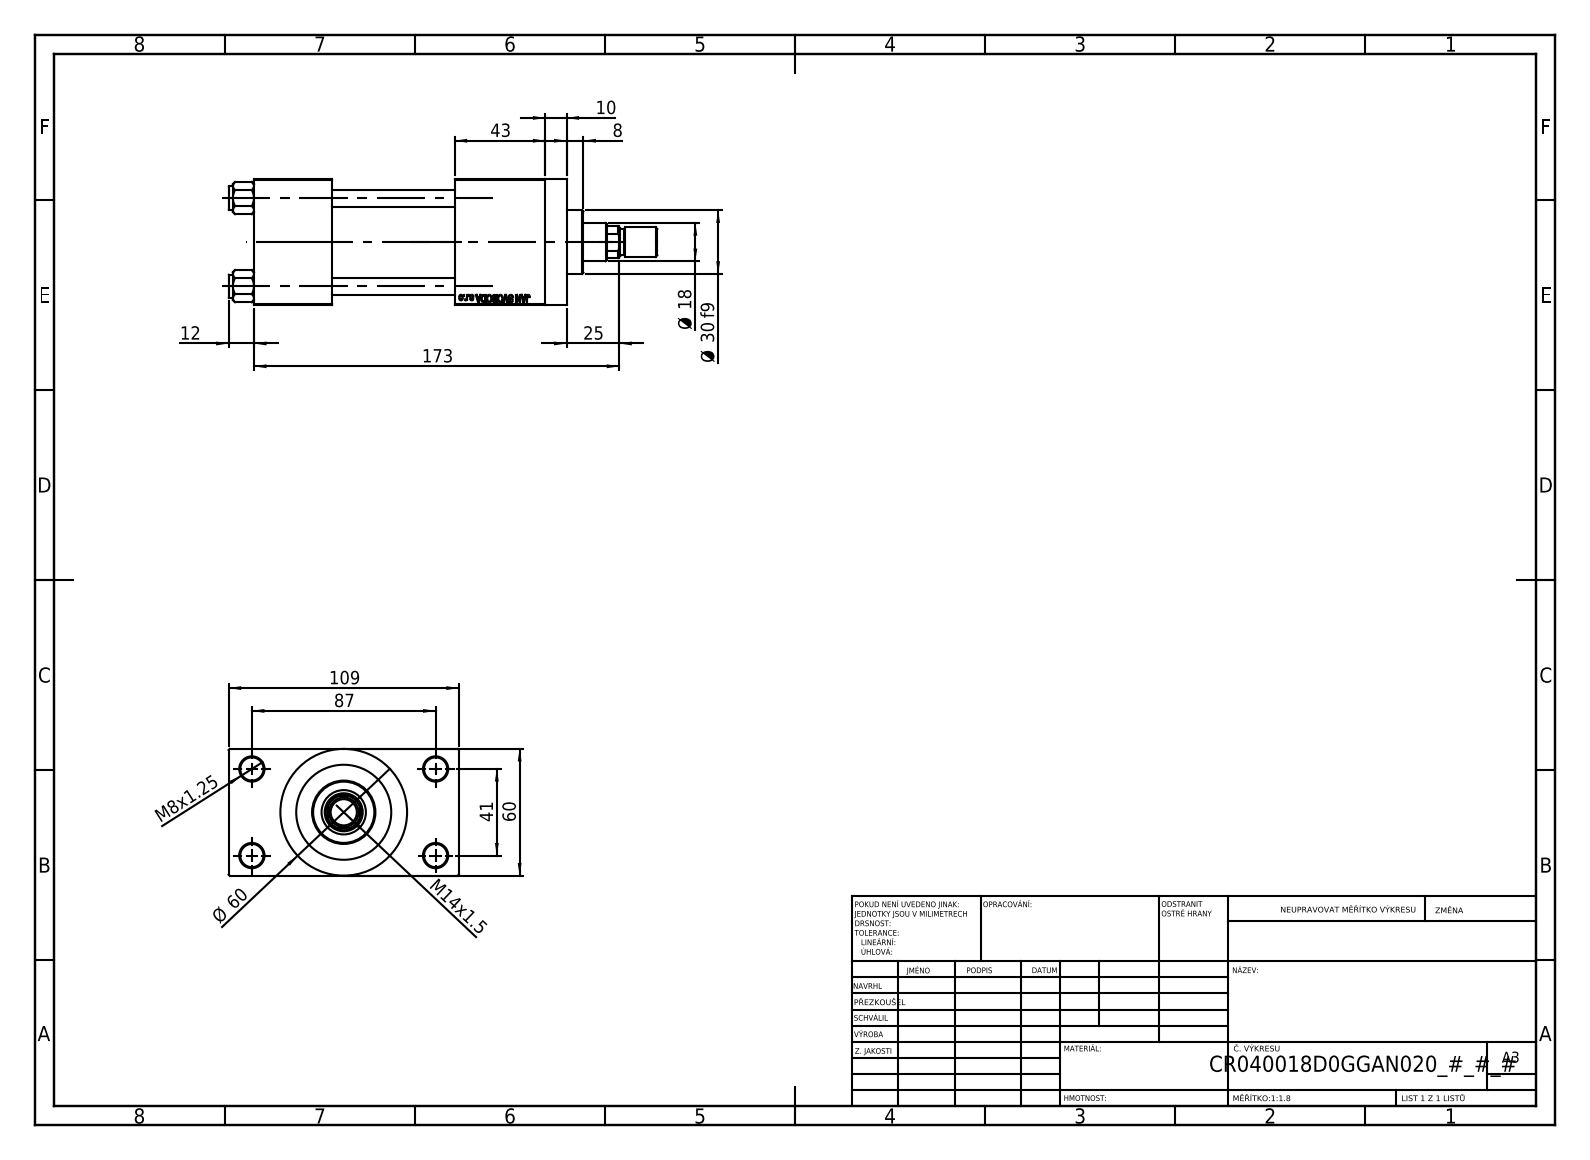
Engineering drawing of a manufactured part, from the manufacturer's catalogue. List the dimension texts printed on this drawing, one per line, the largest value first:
173
109
87
Ø 60
60
43
41
Ø 30 f9
25
Ø 18
M14x1.5
12
10
8
M8x1.25
